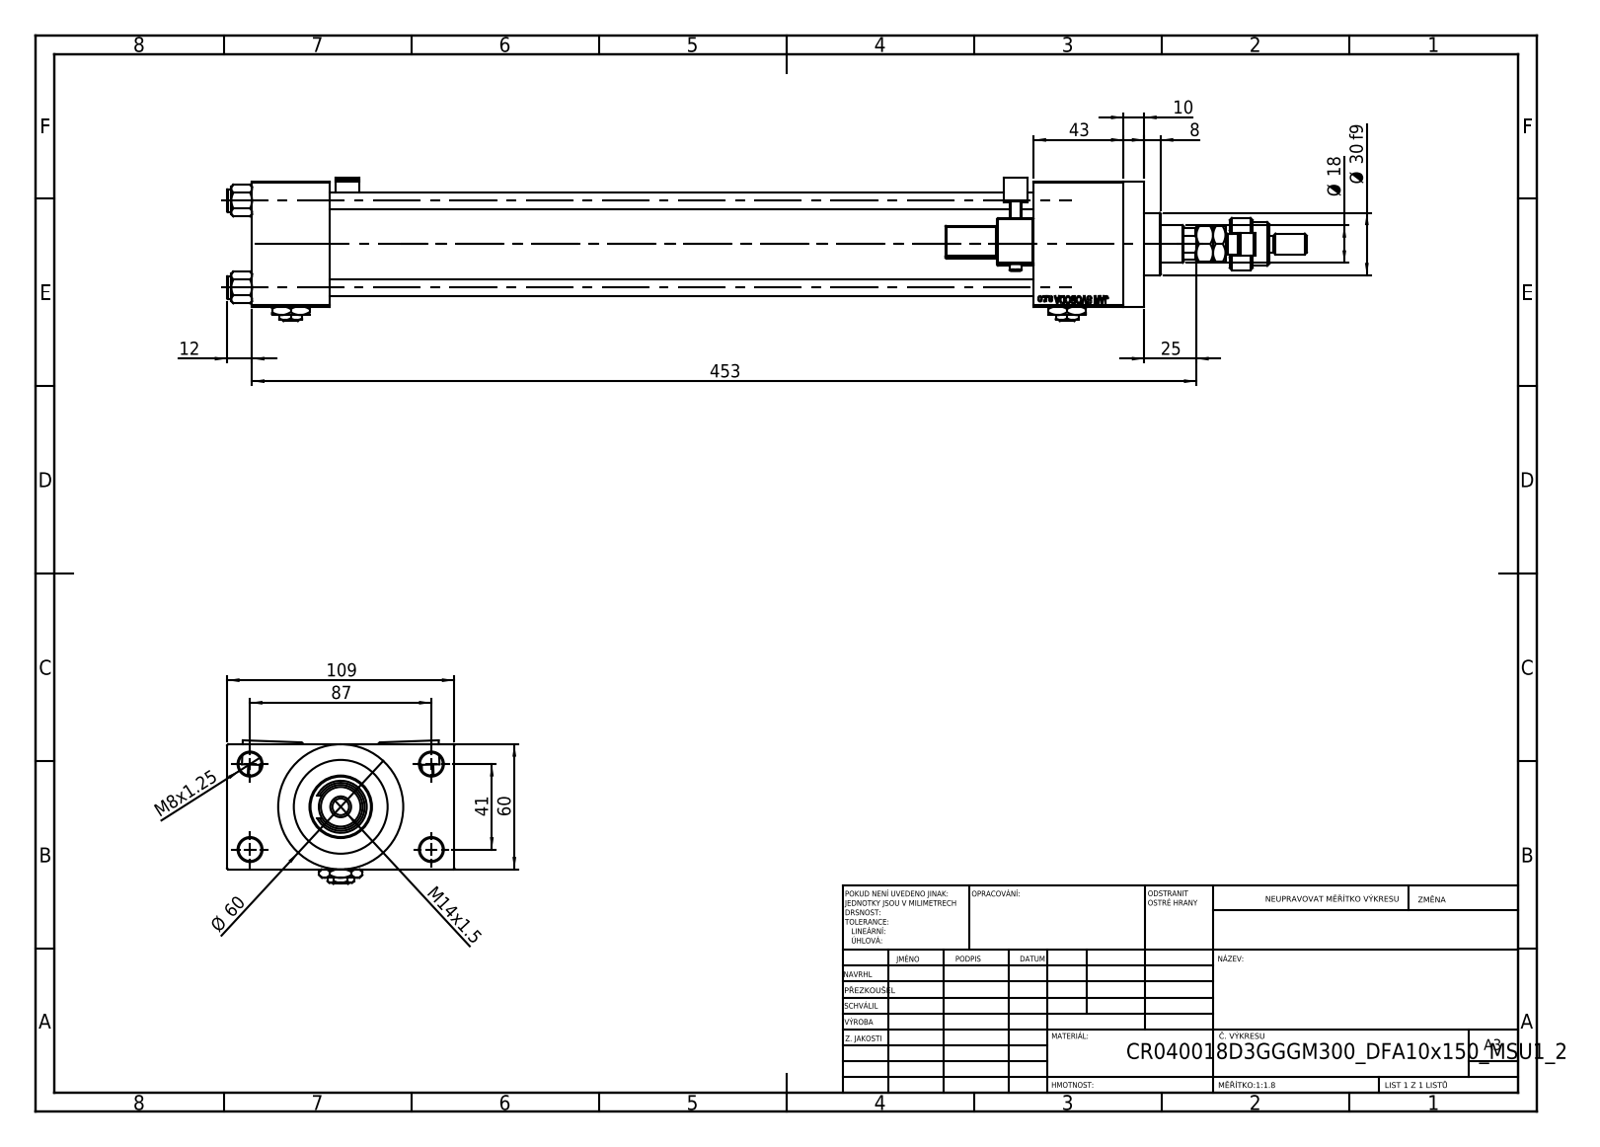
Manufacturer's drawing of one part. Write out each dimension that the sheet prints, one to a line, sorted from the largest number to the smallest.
453
109
87
Ø 60
60
43
41
Ø 30 f9
25
Ø 18
M14x1.5
12
10
8
M8x1.25
